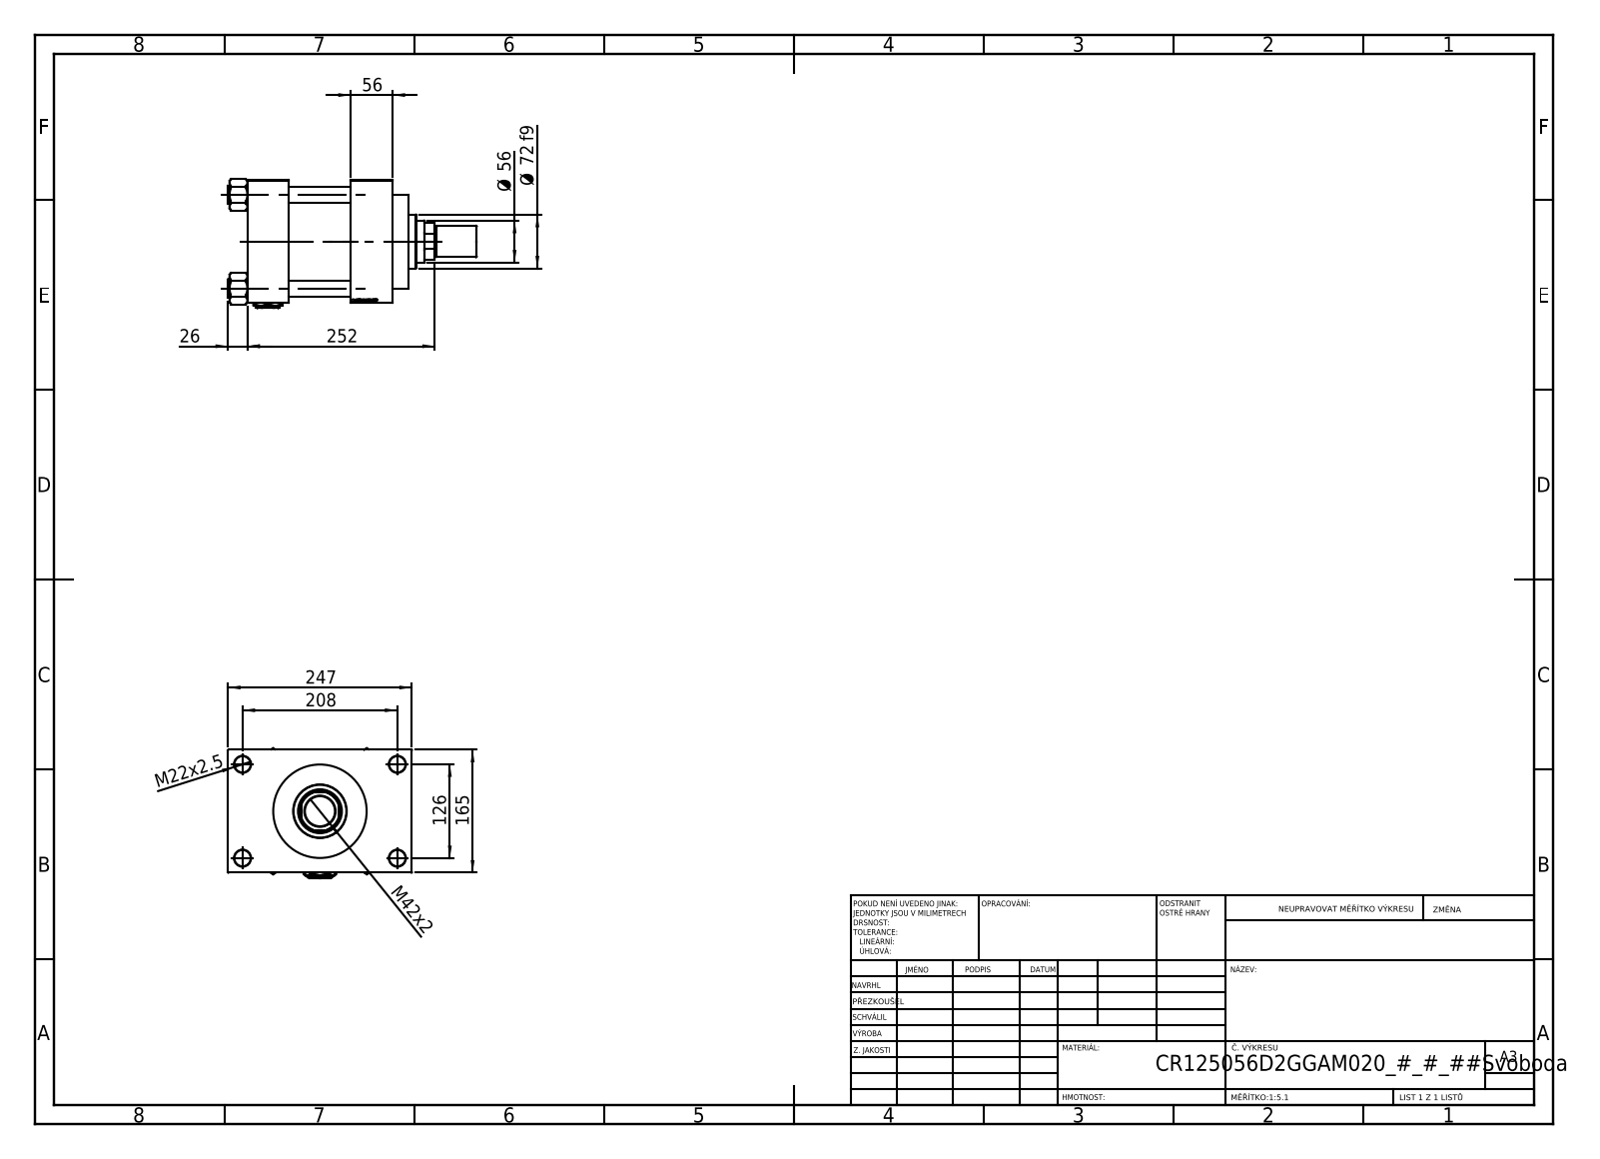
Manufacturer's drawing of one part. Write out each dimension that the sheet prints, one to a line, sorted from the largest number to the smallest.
252
247
208
165
126
Ø 72 f9
56
Ø 56
M42x2
26
M22x2.5
